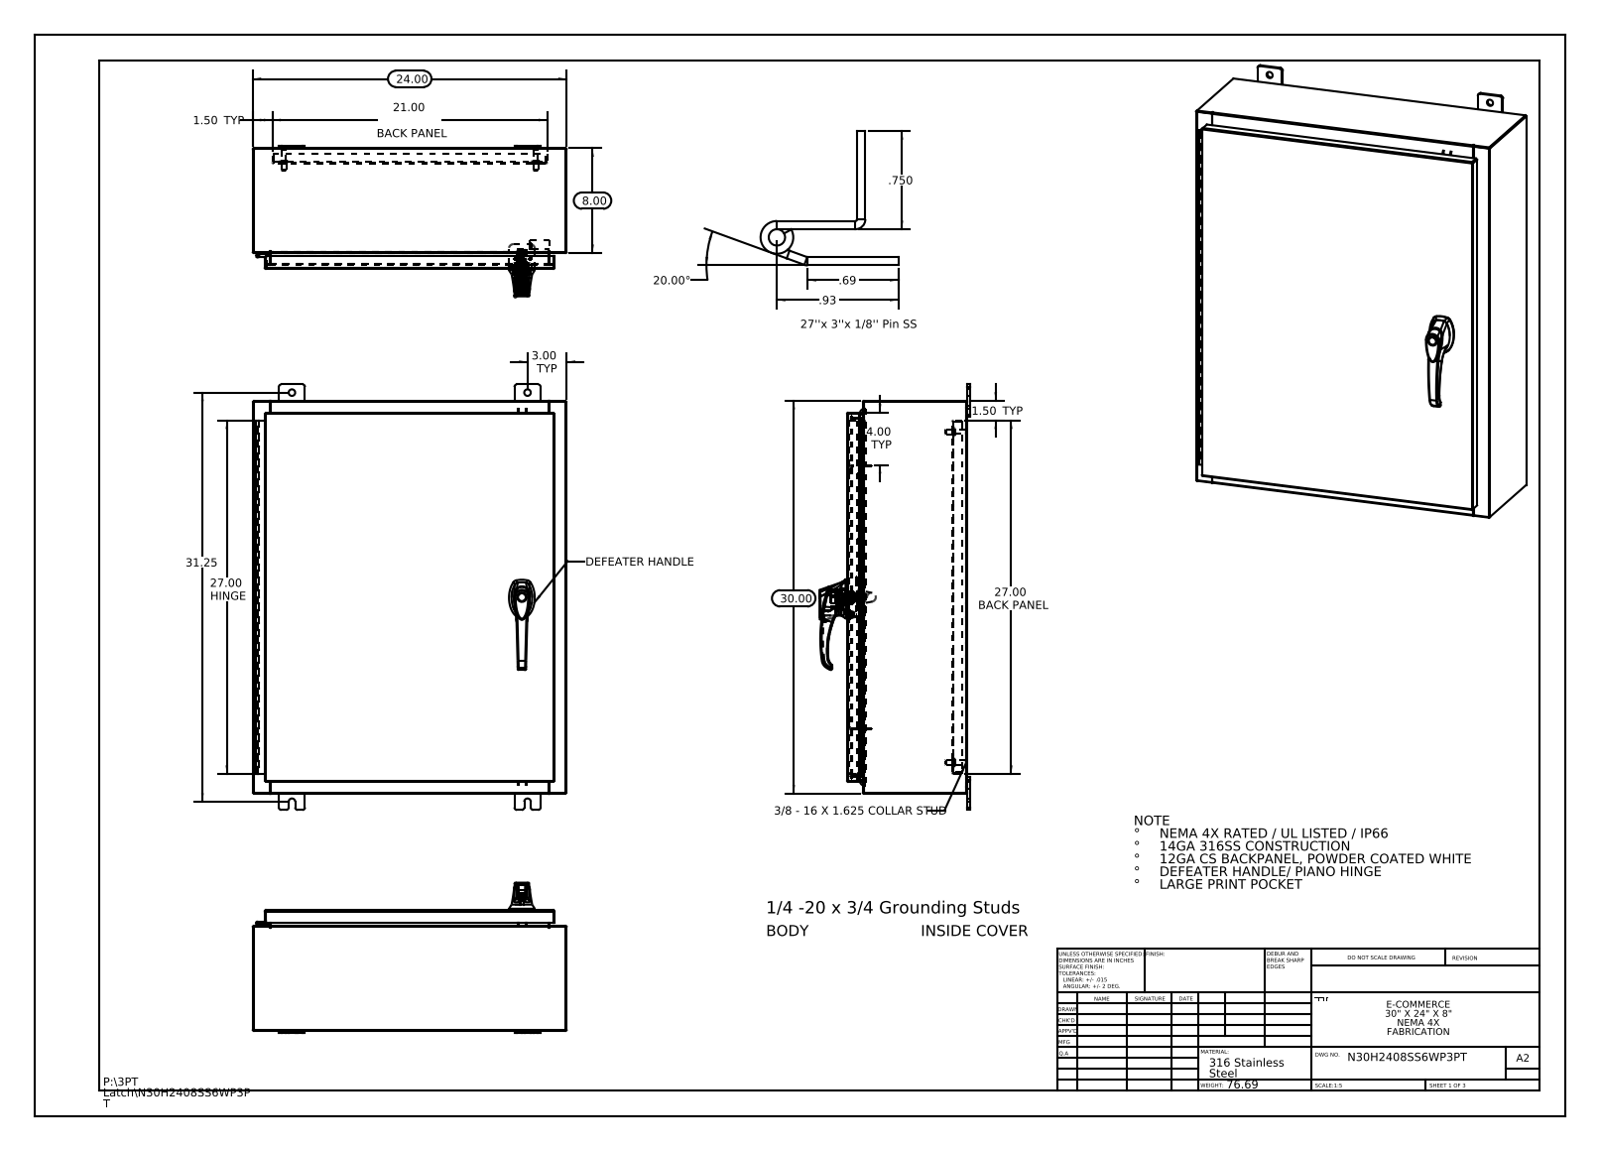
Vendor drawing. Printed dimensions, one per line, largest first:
31.25
30.00
27.00 HINGE
27.00 BACK PANEL
24.00
21.00 BACK PANEL
20.00°
8.00
4.00 TYP
3.00 TYP
1.50 TYP
1.50 TYP
.93
.750
.69
